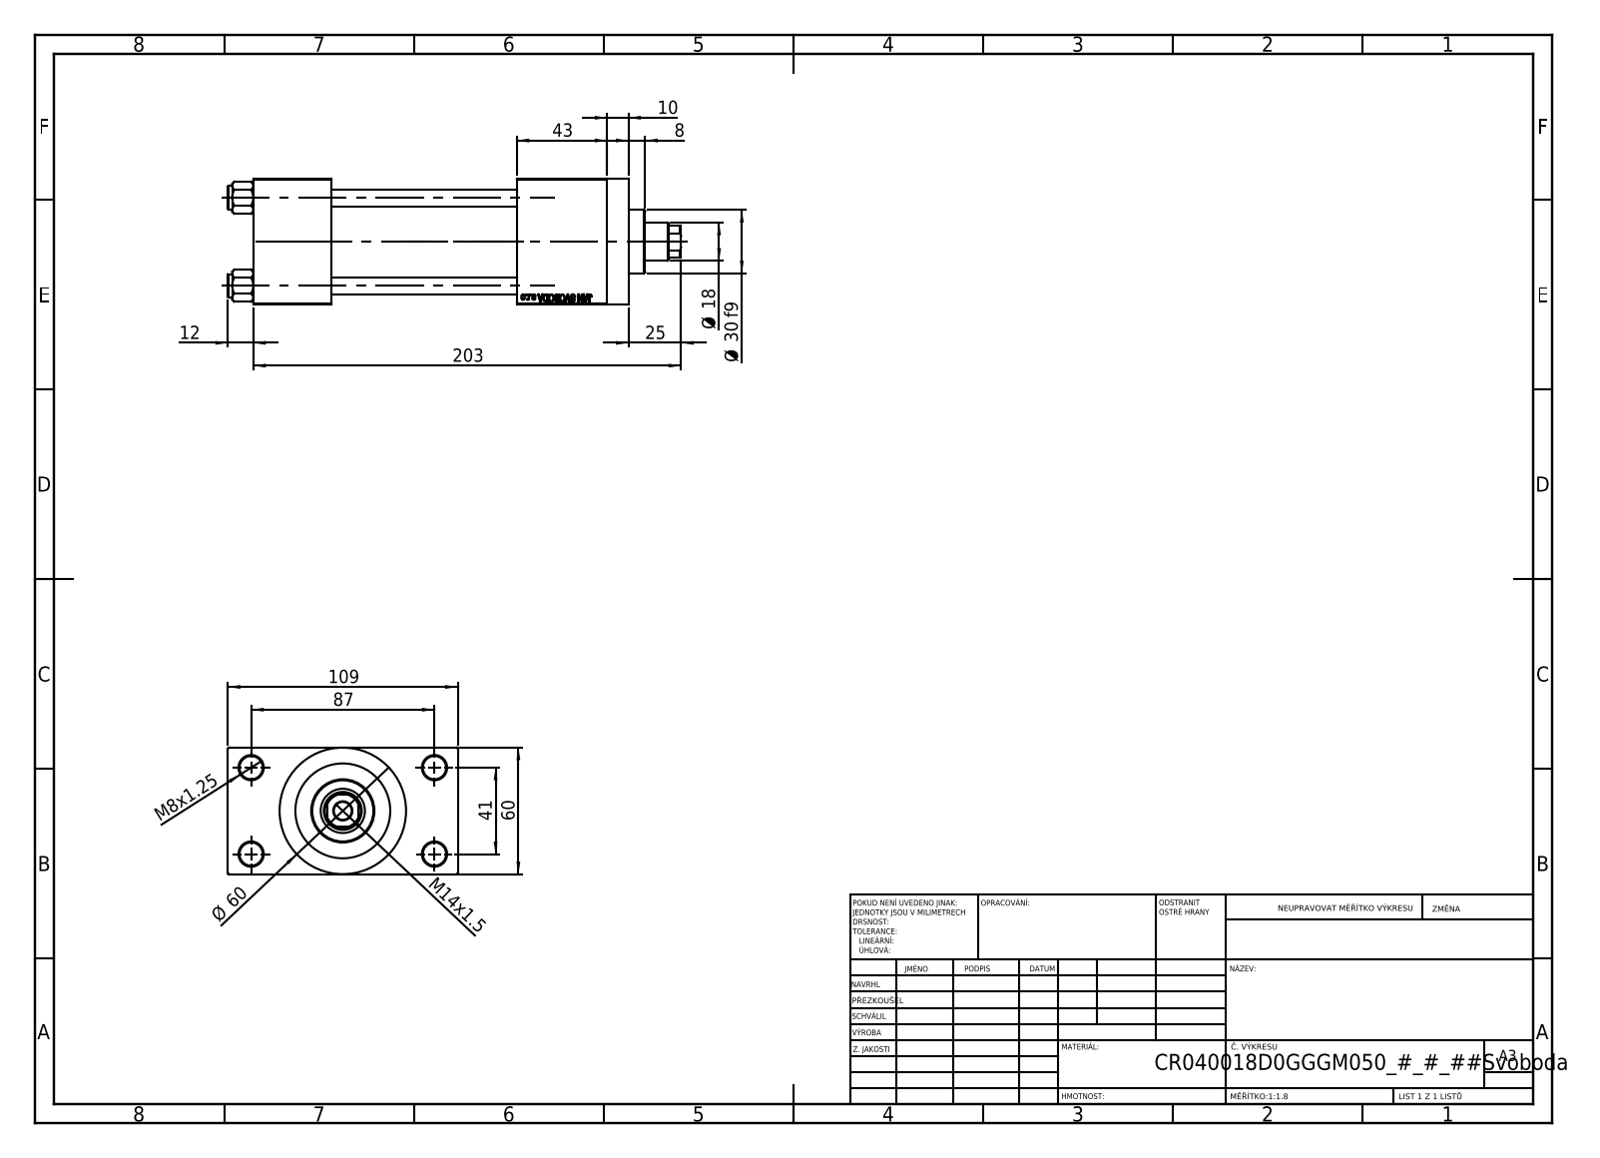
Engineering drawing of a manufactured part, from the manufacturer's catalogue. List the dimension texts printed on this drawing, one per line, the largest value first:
203
109
87
Ø 60
60
43
41
Ø 30 f9
25
Ø 18
M14x1.5
12
10
8
M8x1.25
